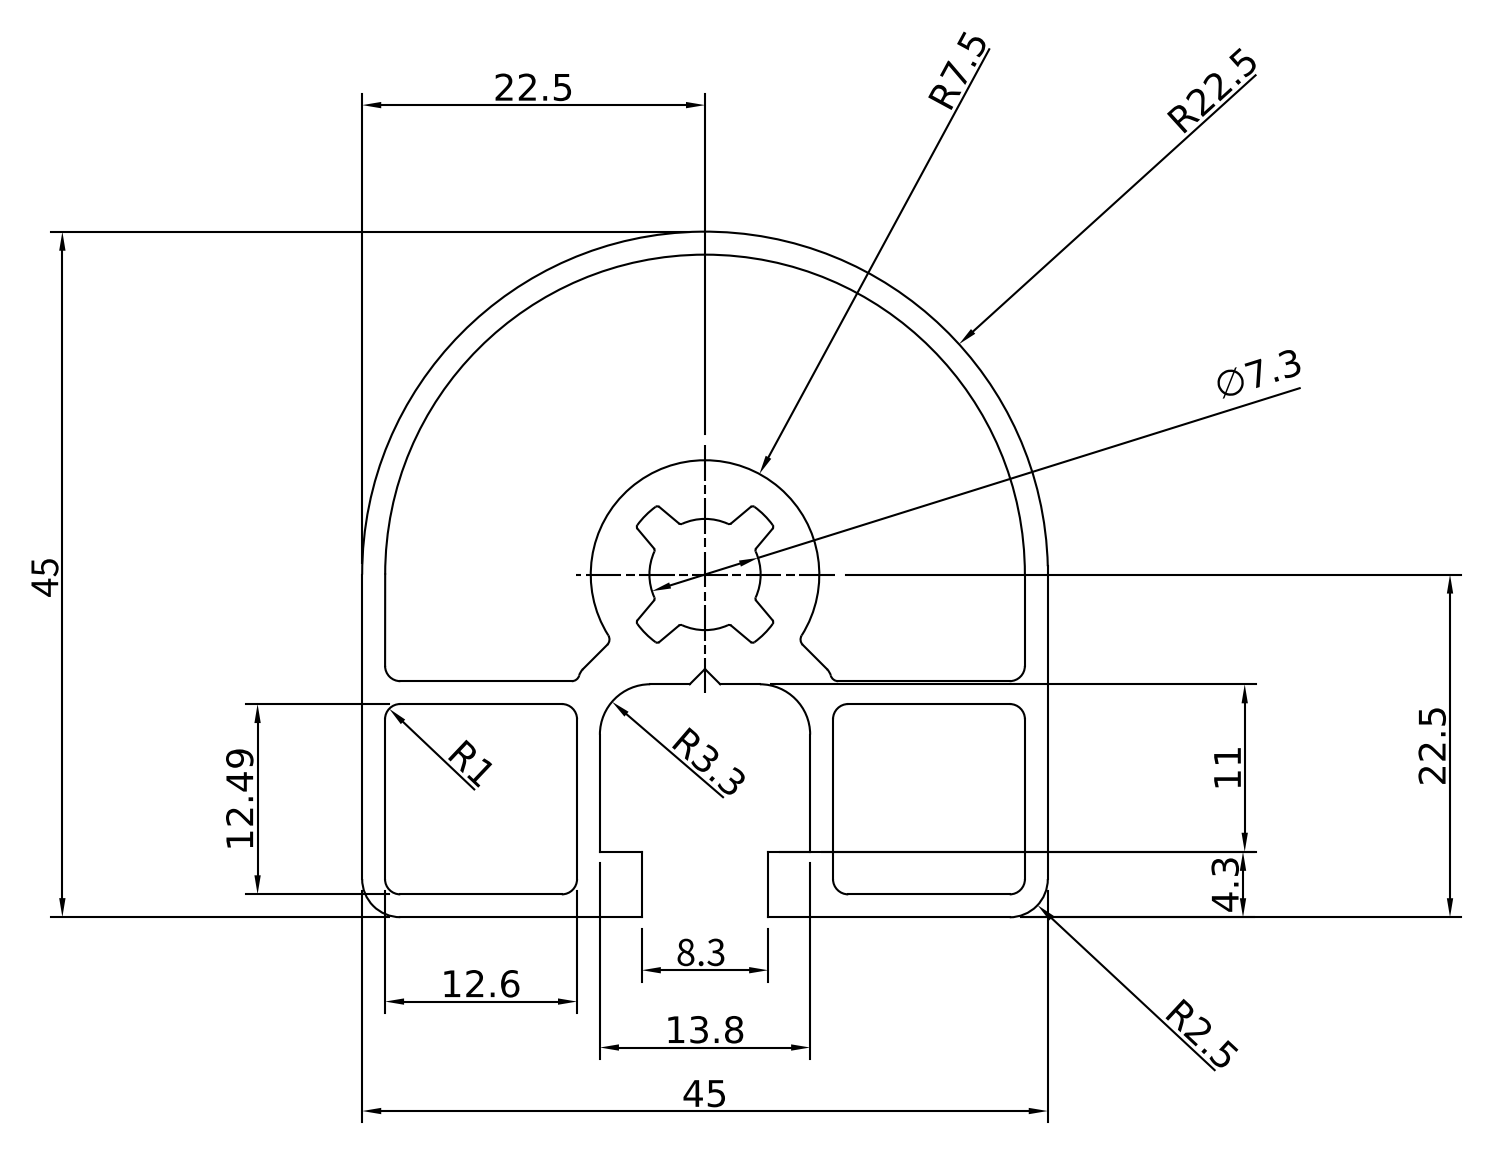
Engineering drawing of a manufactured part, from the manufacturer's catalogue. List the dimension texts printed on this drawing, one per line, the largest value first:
45
45
R22.5
22.5
22.5
13.8
12.6
12.49
11
8.3
R7.5
∅7.3
4.3
R3.3
R2.5
R1
